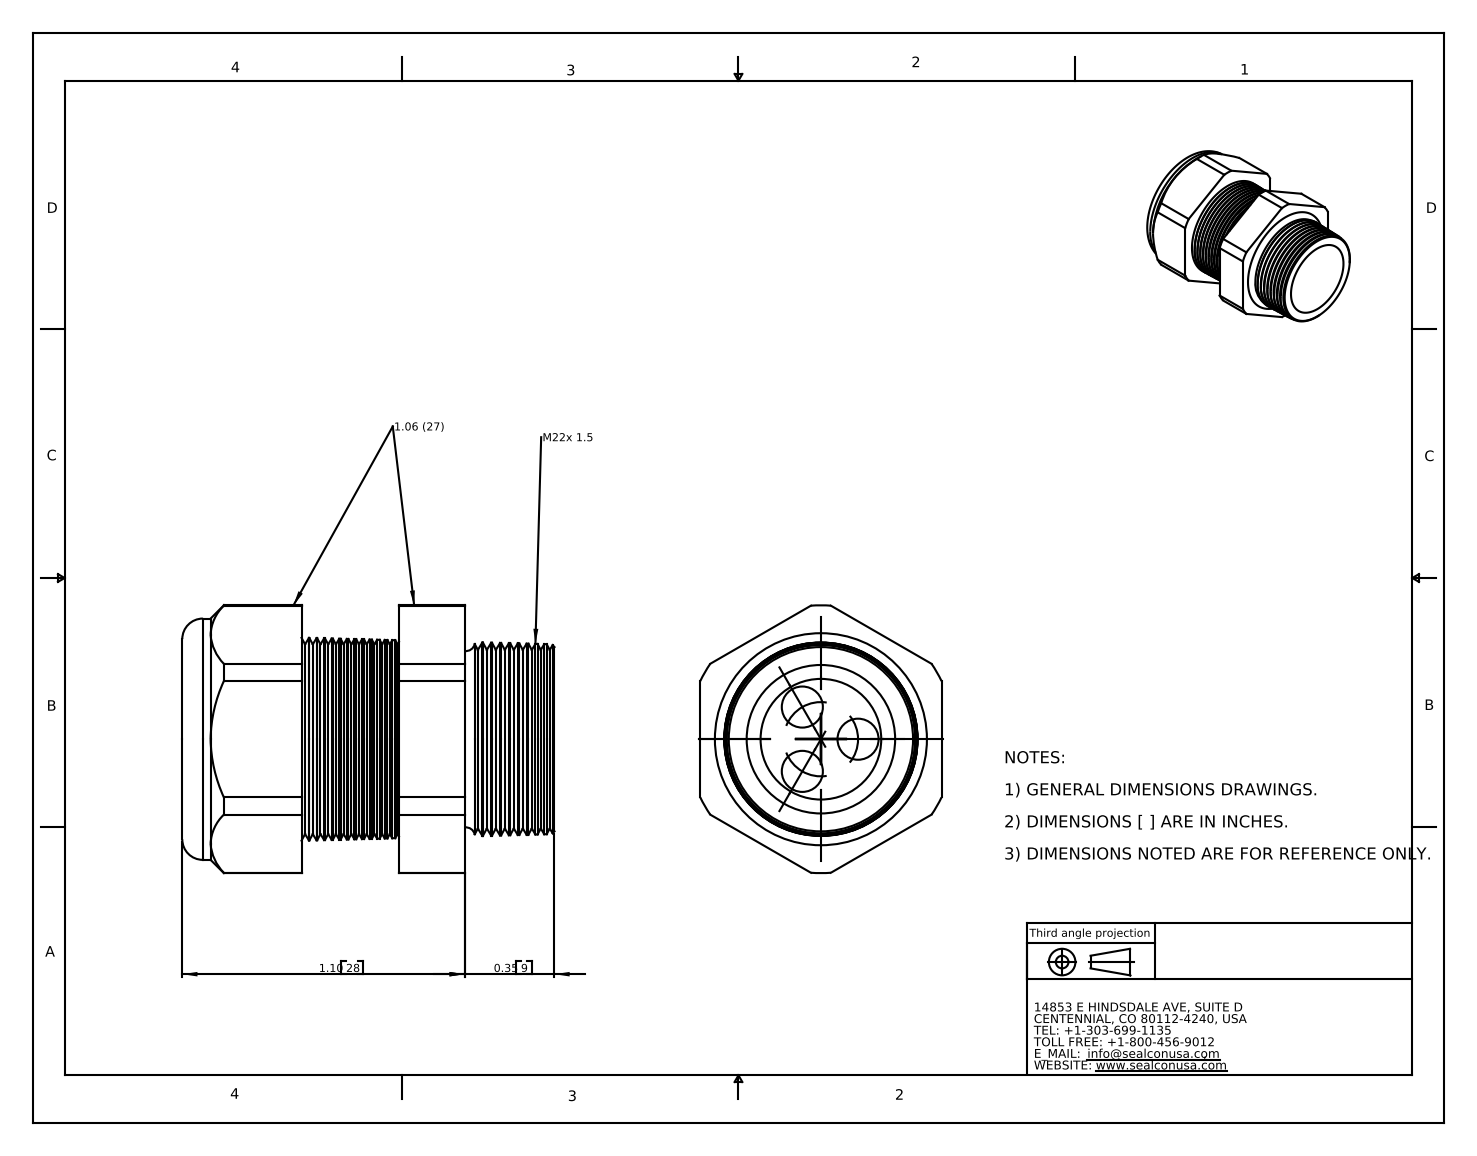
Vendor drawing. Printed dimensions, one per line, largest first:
1.10 28
0.35 9
